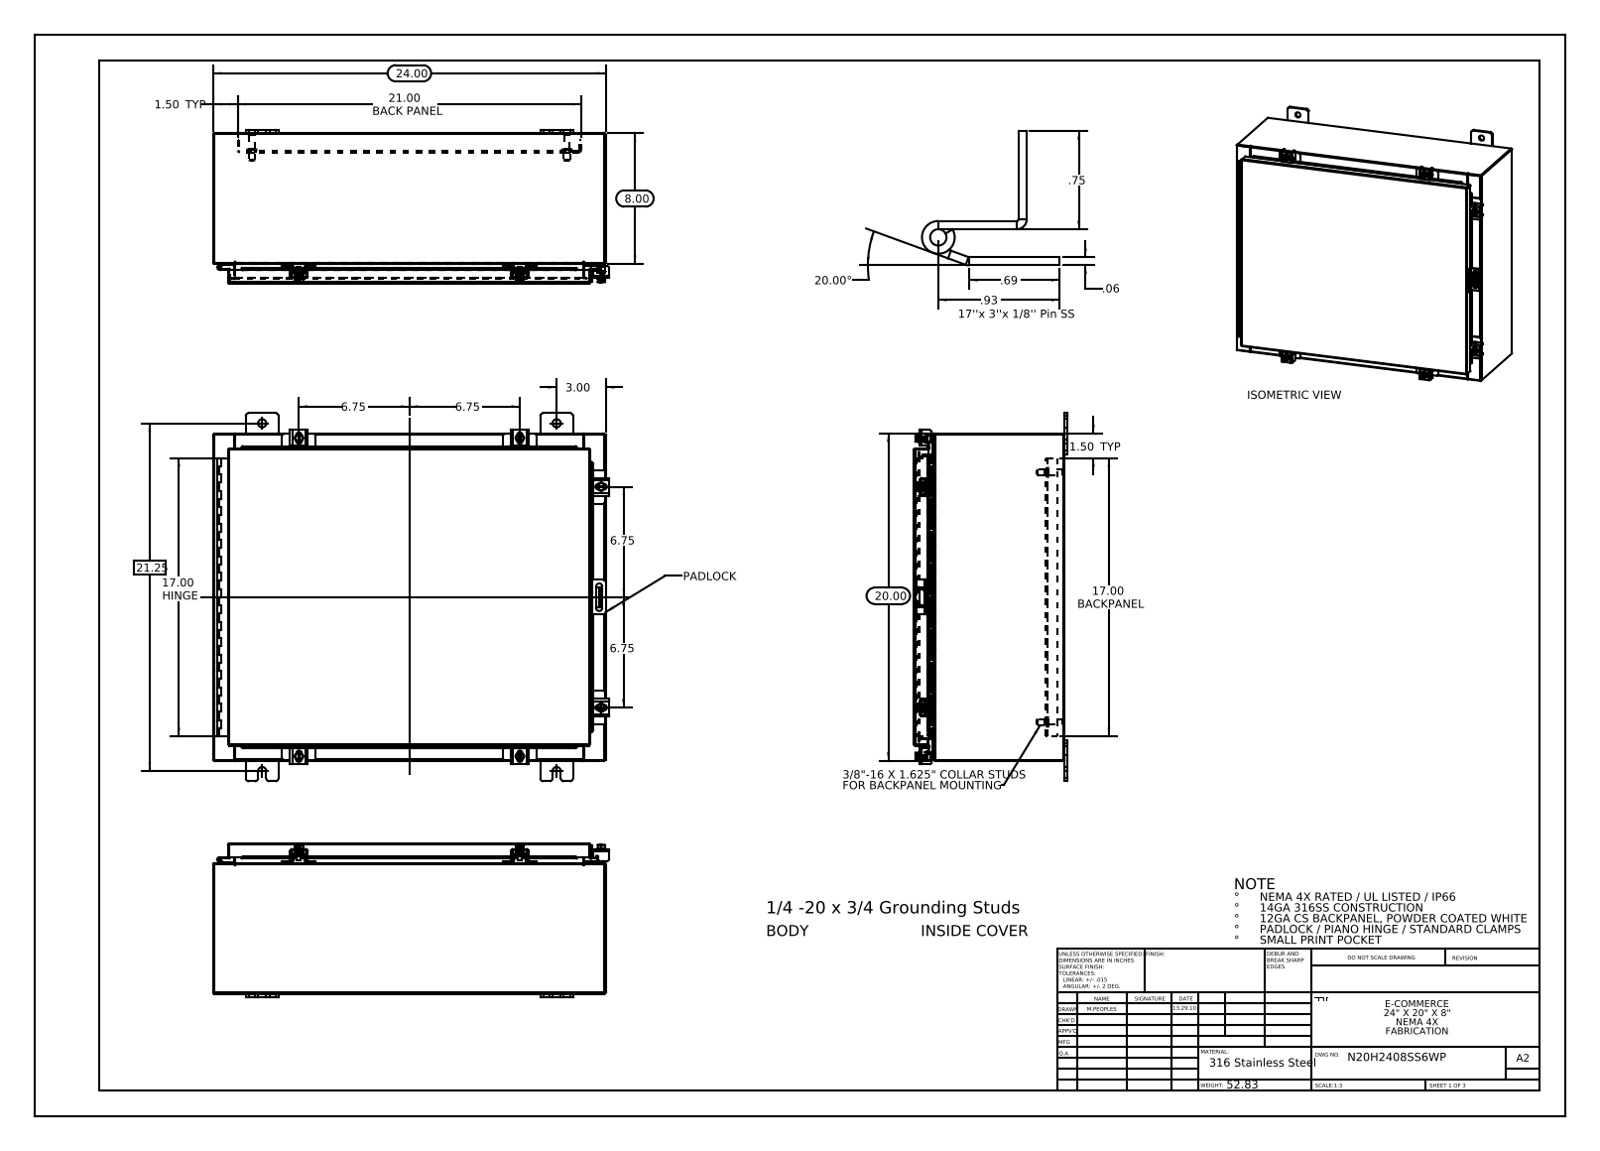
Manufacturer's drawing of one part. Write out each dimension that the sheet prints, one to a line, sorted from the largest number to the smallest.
24.00
21.25
21.00 BACK PANEL
20.00
20.00°
17.00 HINGE
17.00 BACKPANEL
8.00
6.75
6.75
6.75
6.75
3.00
1.50 TYP
1.50 TYP
.93
.75
.69
.06
